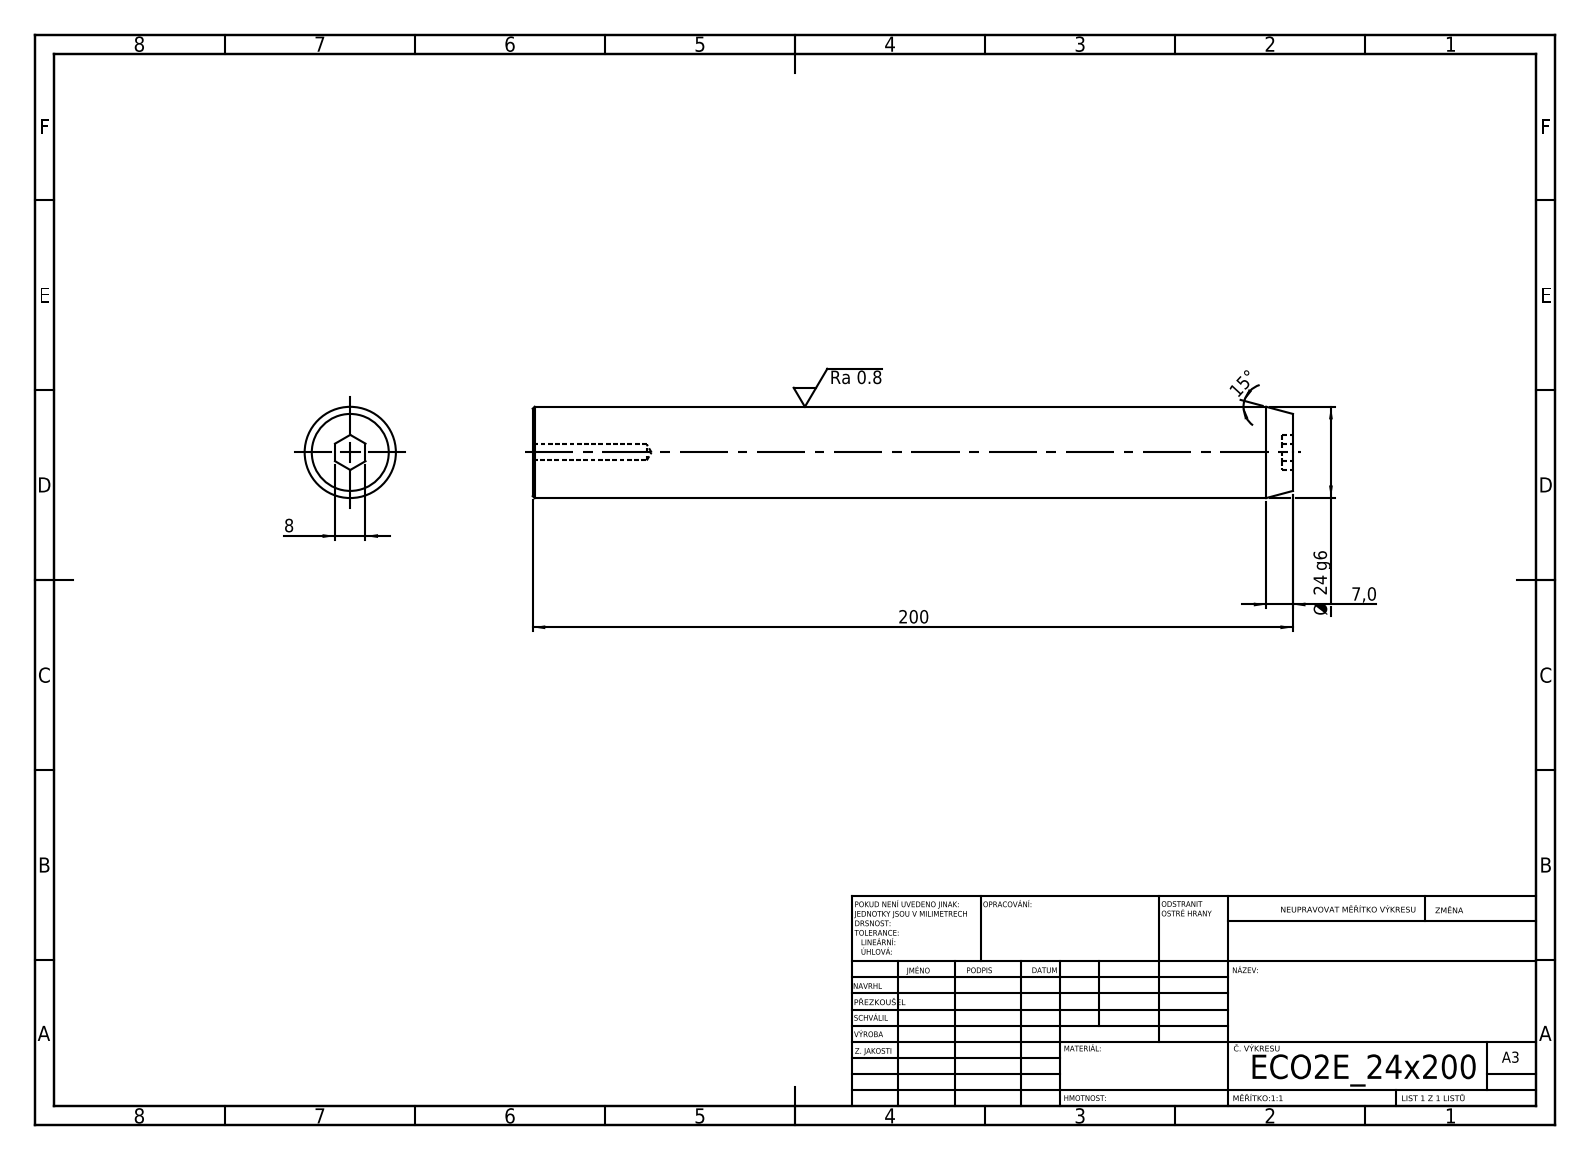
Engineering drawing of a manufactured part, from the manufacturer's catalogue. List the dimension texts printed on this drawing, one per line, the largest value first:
200
Ø 24 g6
15°
8
7,0
